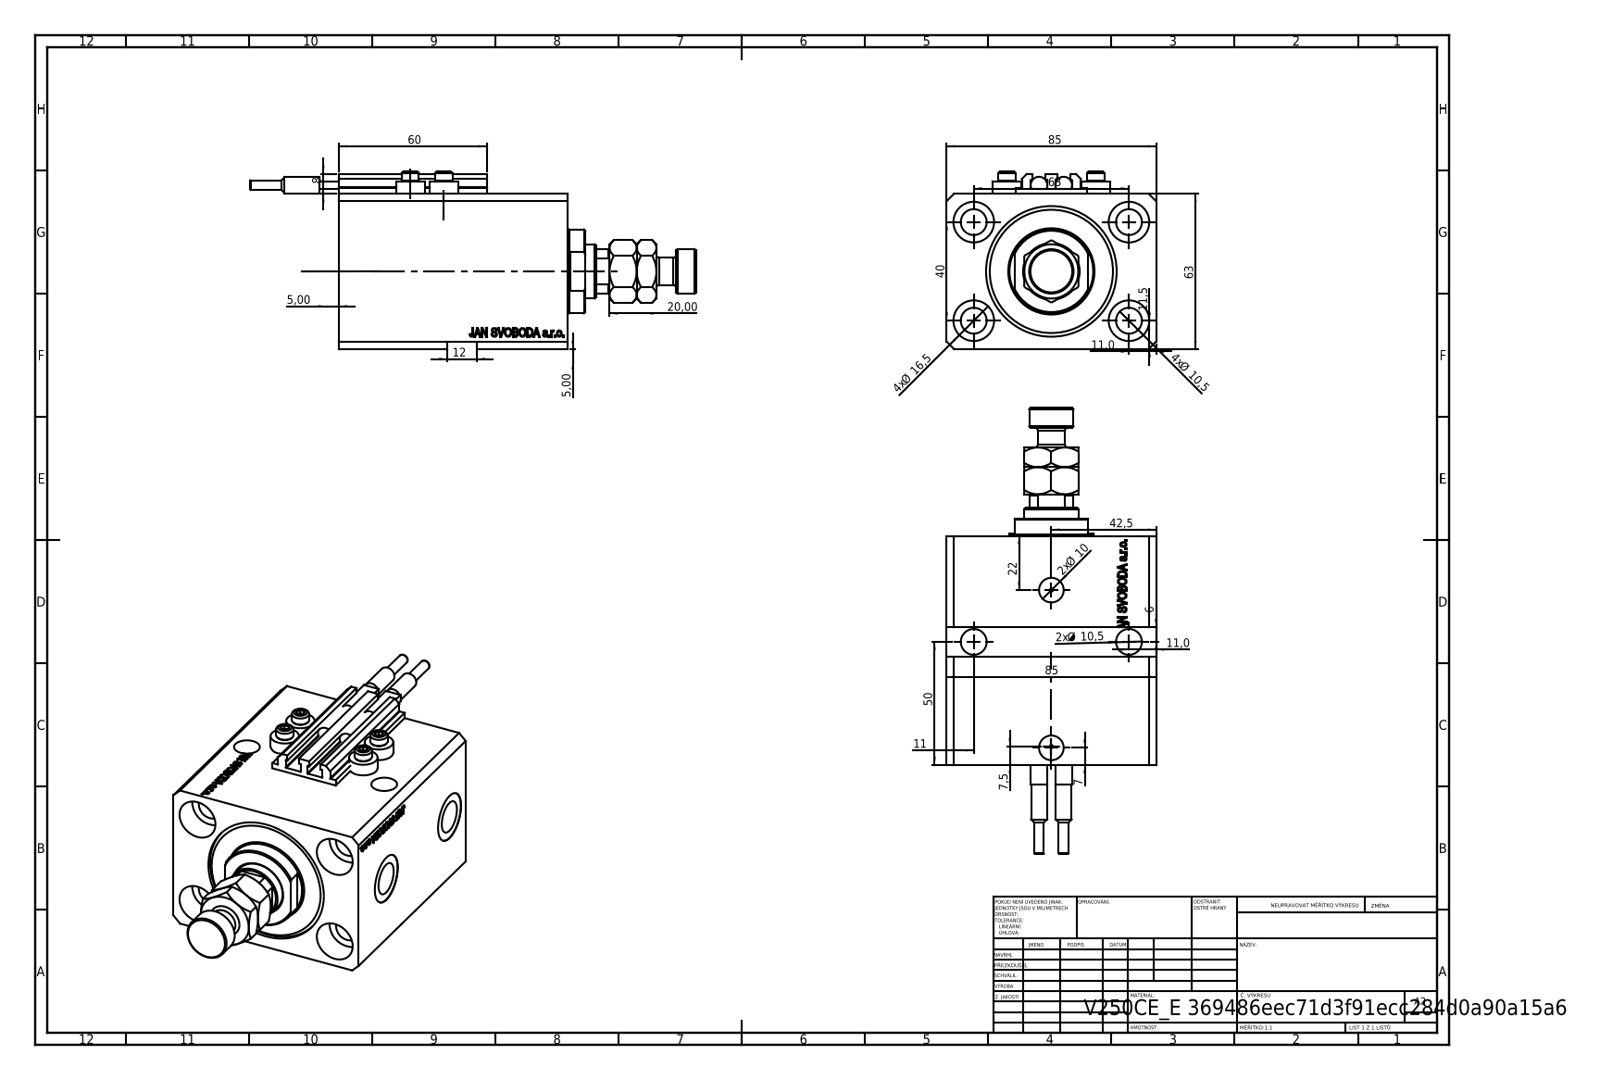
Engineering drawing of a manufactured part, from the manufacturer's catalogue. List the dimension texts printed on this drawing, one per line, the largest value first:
85
85
63
63
60
50
42,5
40
22
20,00
4x Ø 16,5
12
11,5
11,0
11,0
11
4x Ø 10,5
2x Ø 10,5
2x Ø 10
8
7,5
7
6
5,00
5,00
